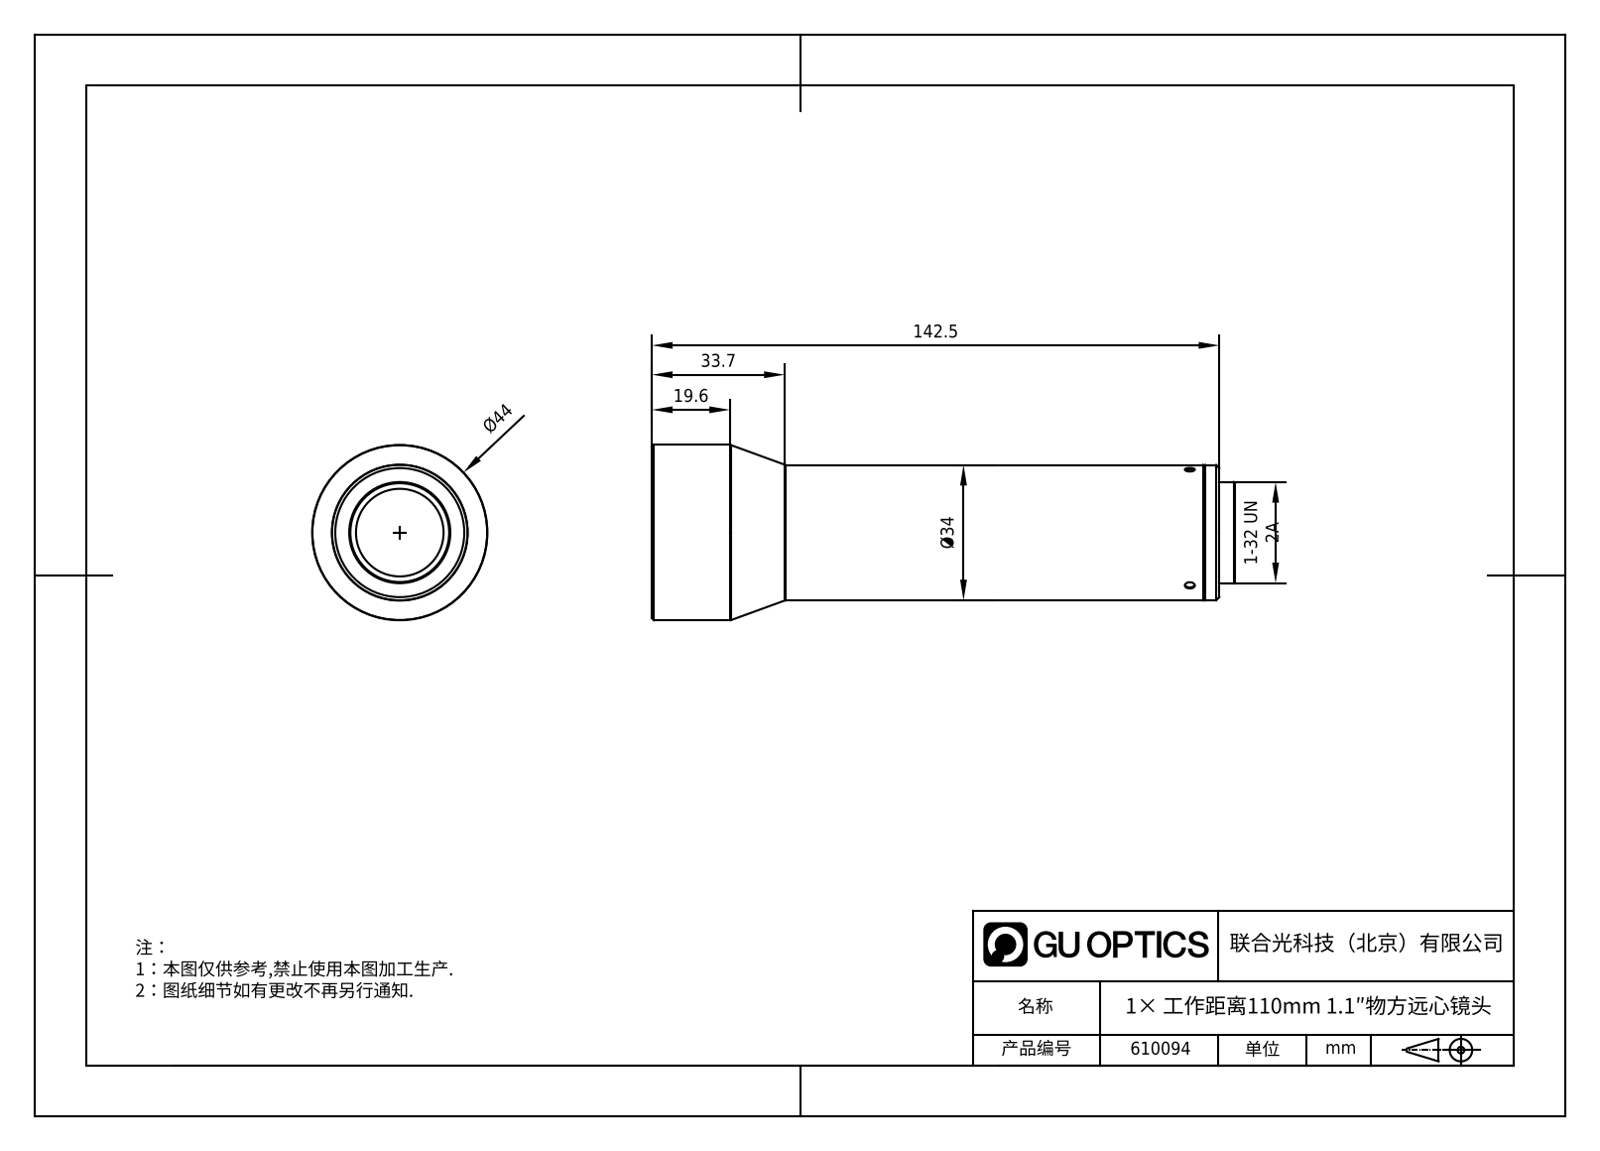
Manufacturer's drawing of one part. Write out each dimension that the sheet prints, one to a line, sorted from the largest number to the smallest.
142.5
Ø44
Ø34
33.7
19.6
1-32 UN 2A
